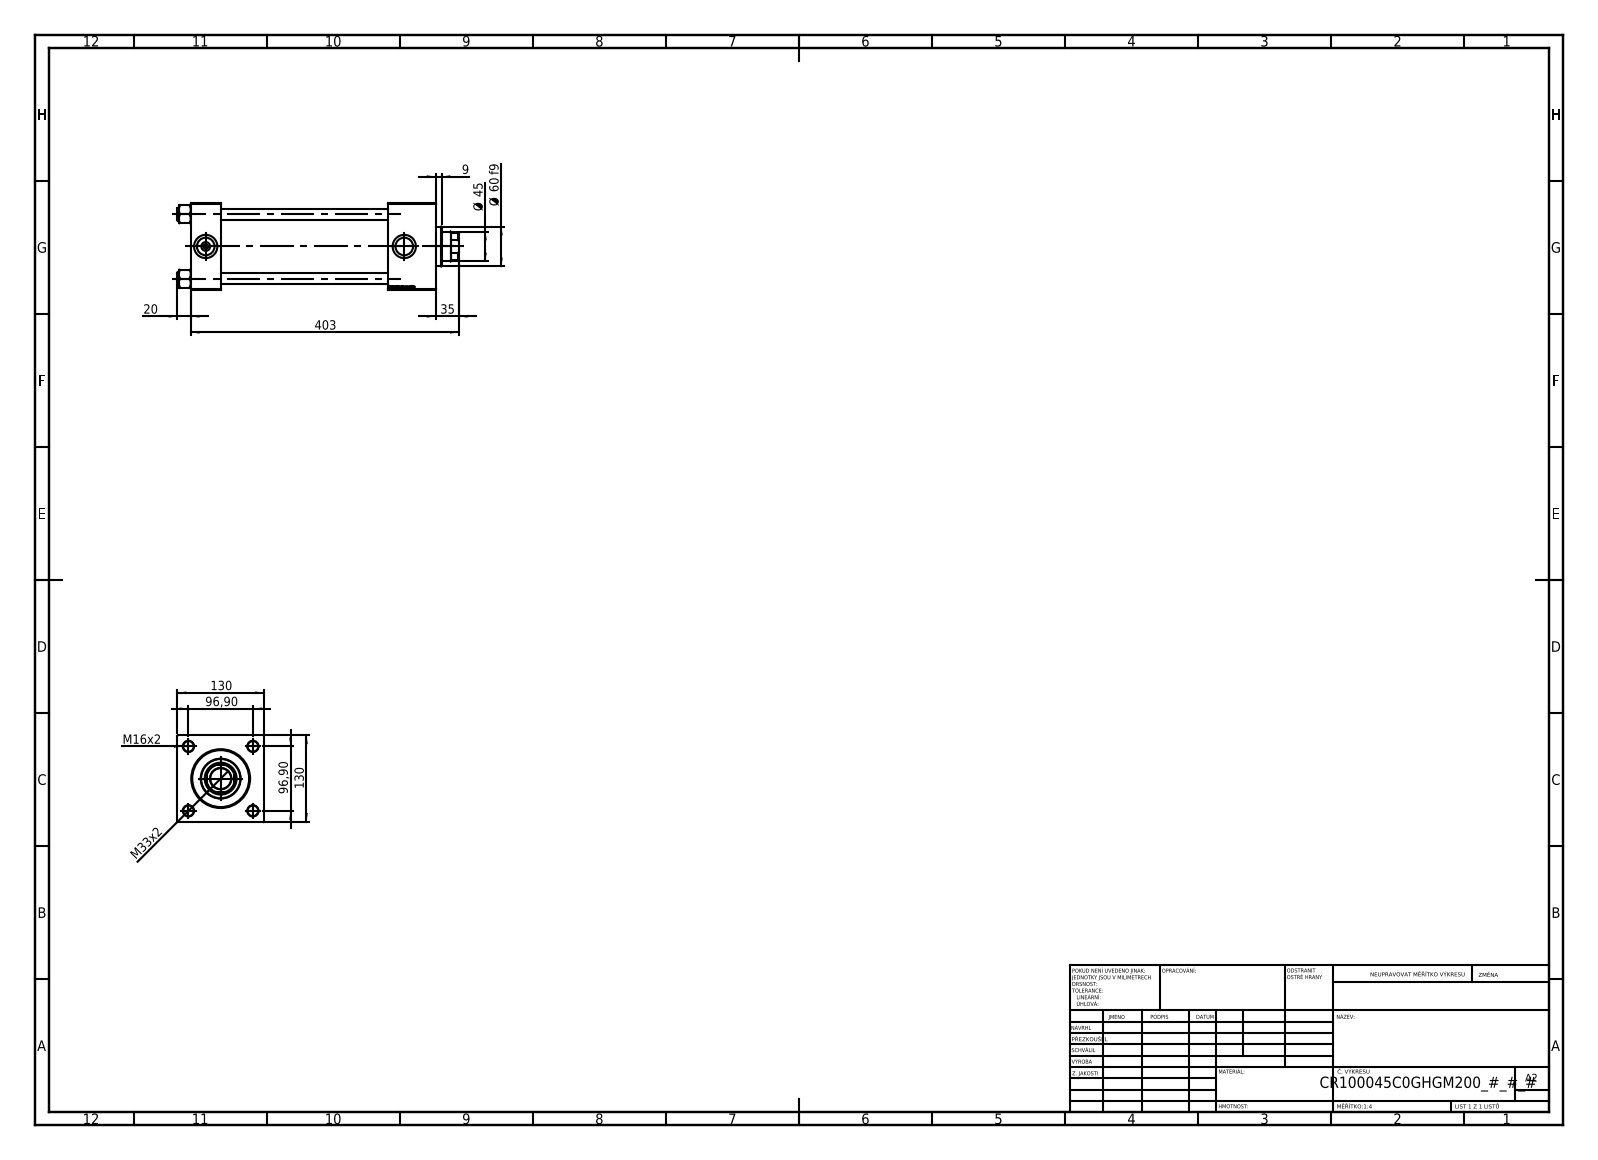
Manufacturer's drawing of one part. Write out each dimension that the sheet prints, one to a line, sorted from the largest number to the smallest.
403
130
130
96,90
96,90
Ø 60 f9
Ø 45
35
M33x2
20
M16x2
9
